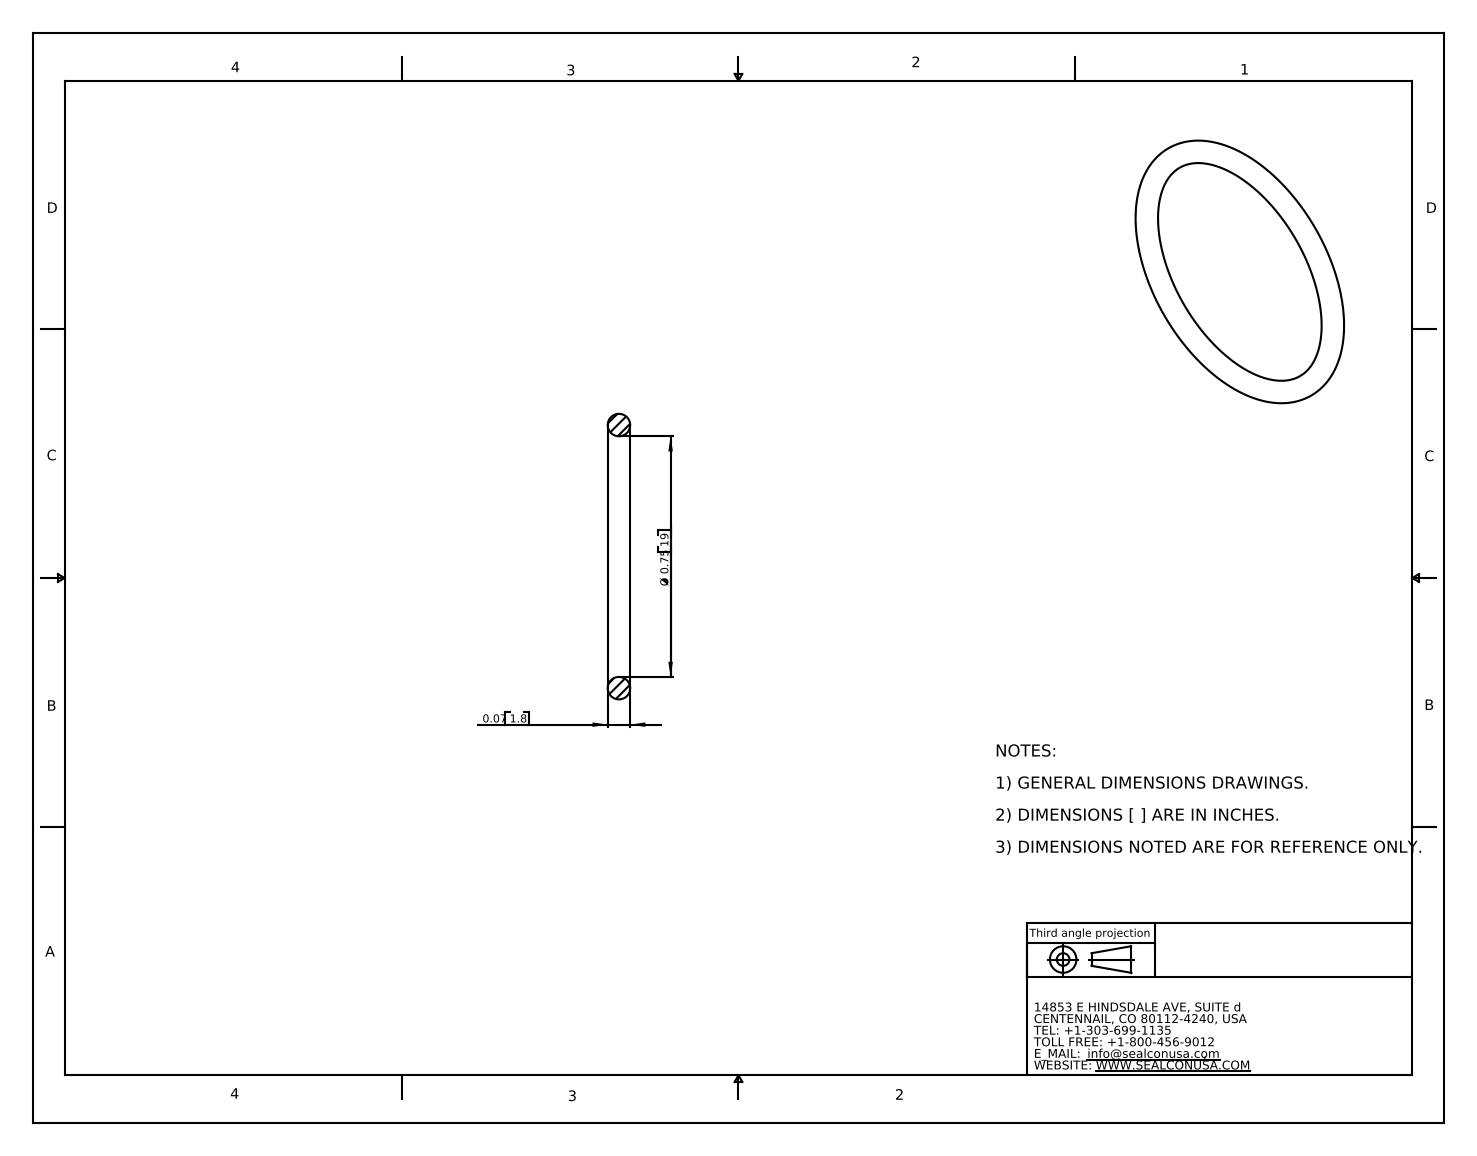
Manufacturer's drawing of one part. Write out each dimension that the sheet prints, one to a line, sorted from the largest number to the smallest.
Ø 0.75 19
0.07 1.8
